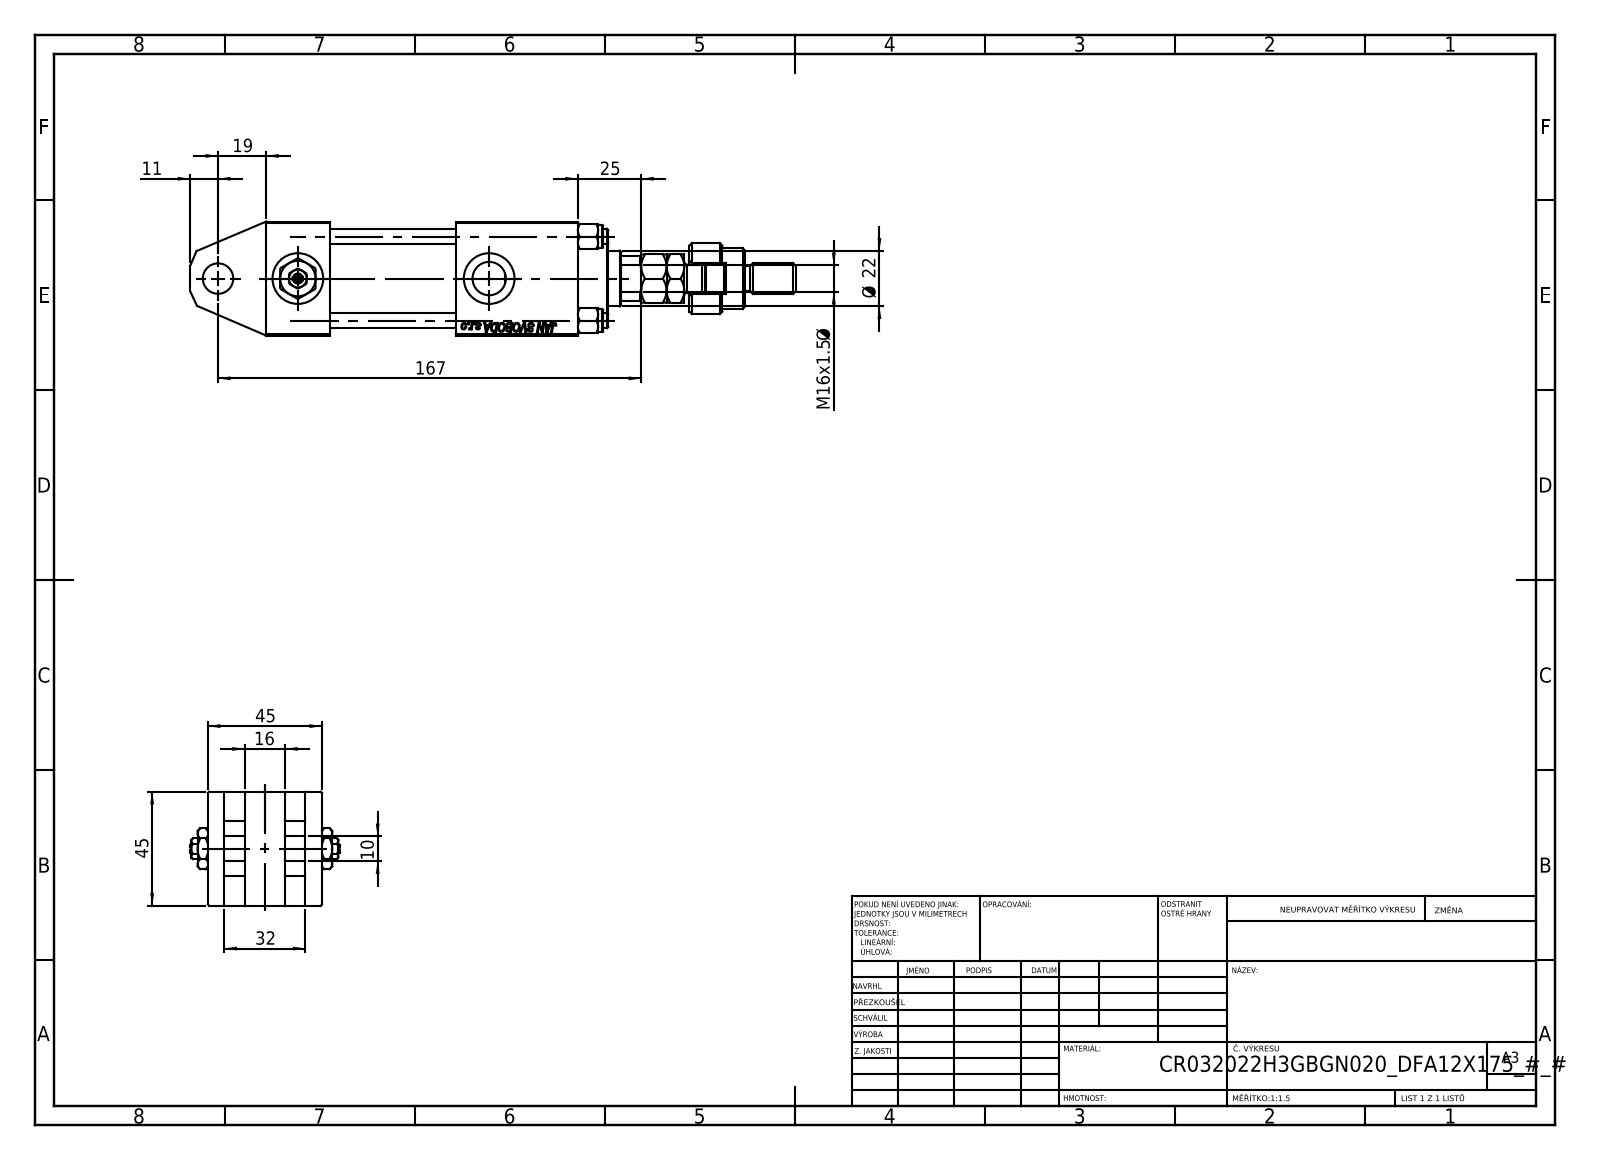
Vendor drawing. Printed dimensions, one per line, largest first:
167
45
45
32
25
Ø 22
19
M16x1.5 Ø
16
11
10
